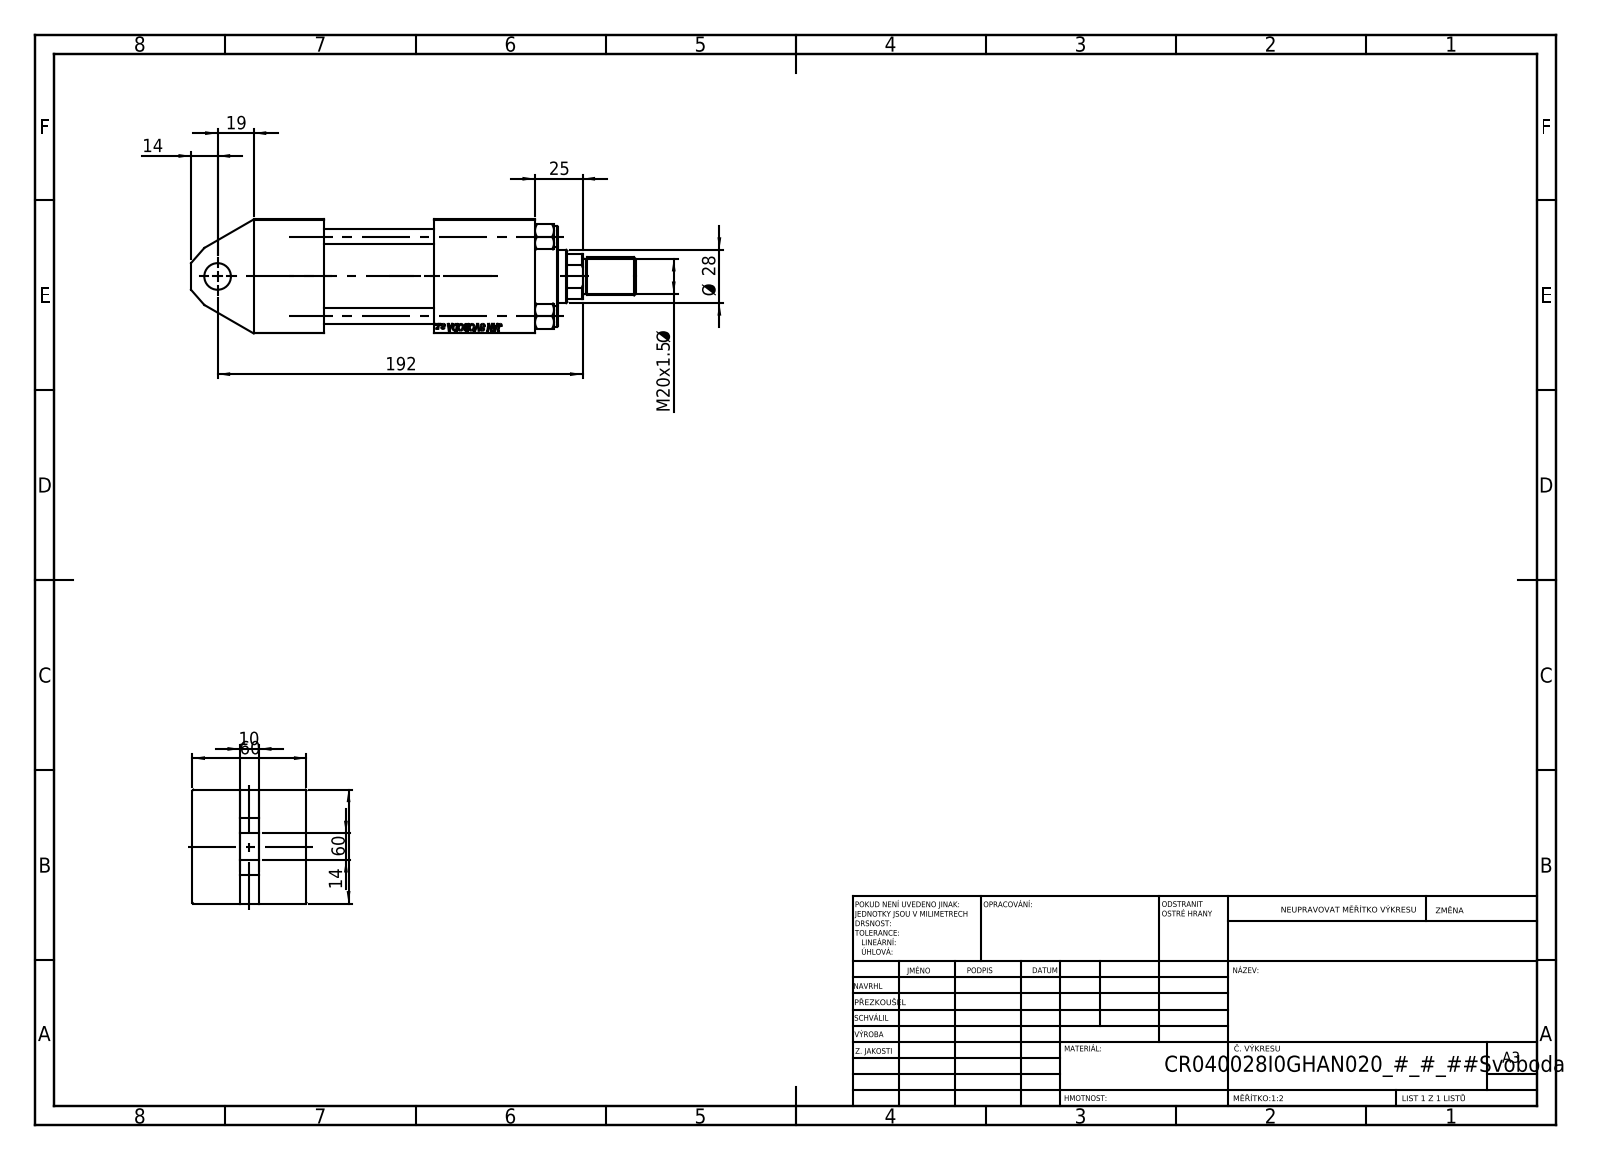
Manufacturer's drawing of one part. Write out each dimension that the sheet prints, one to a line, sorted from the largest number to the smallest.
192
60
60
Ø 28
25
M20x1.5 Ø
19
14
14
10
